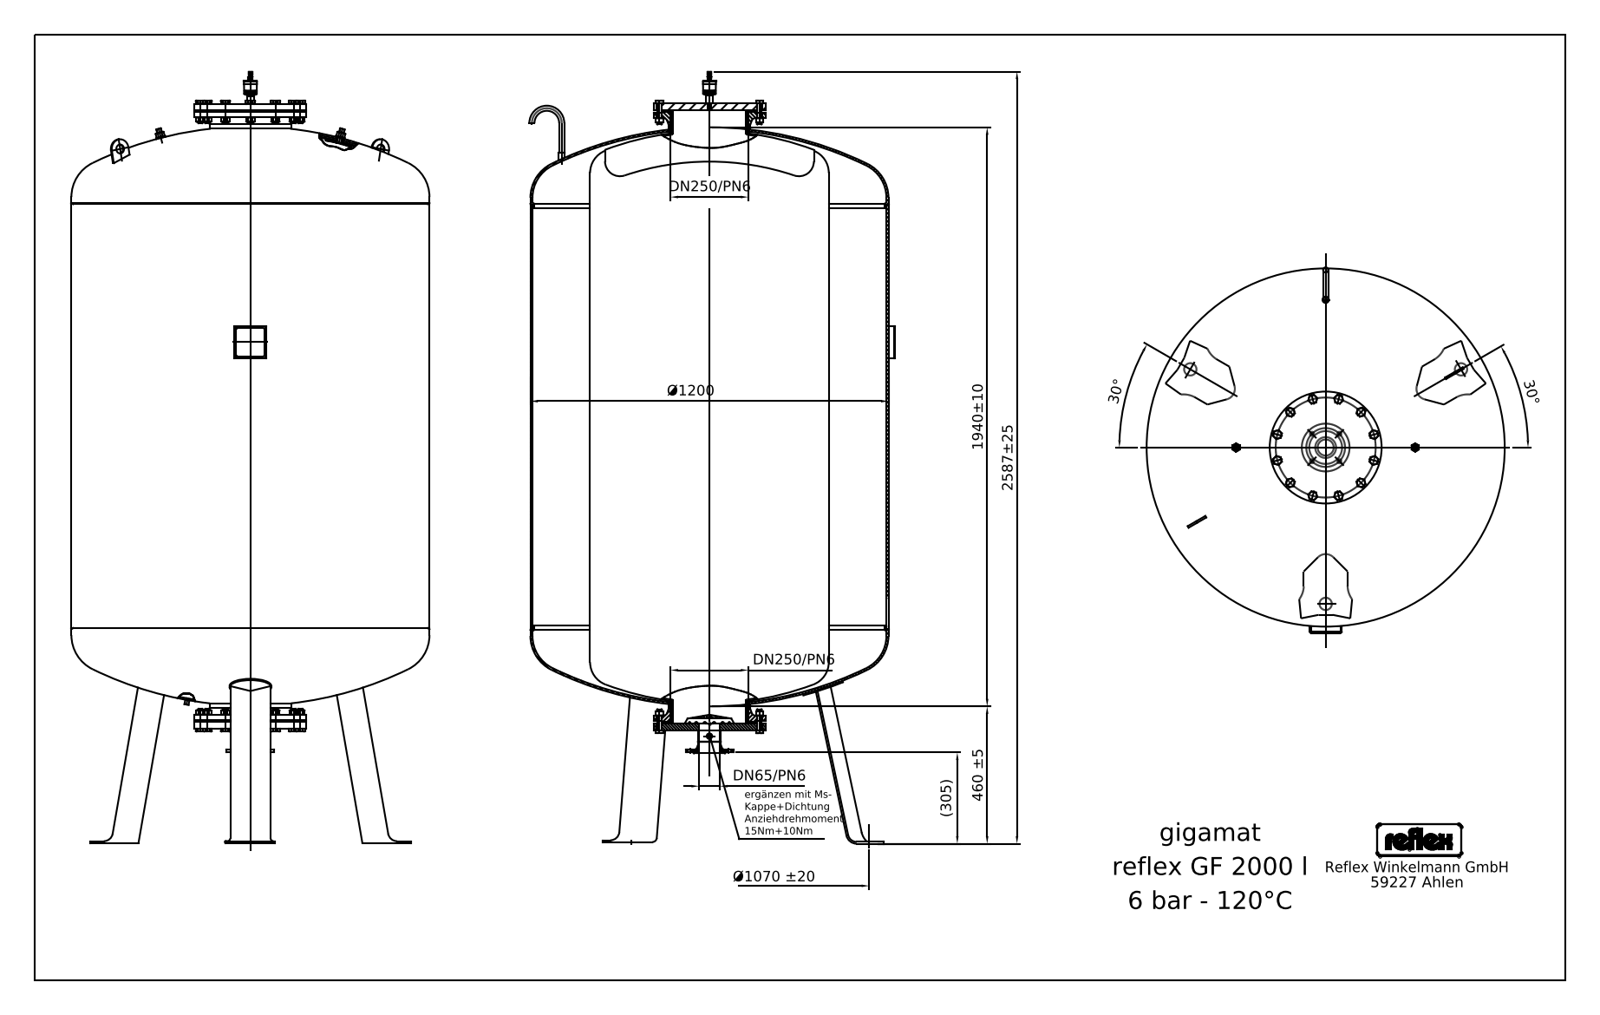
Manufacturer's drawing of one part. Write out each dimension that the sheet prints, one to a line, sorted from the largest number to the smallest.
2587±25
1940±10
Ø1200
Ø1070 ±20
460 ±5
(305)
DN250/PN6
DN250/PN6
DN65/PN6
30°
30°
